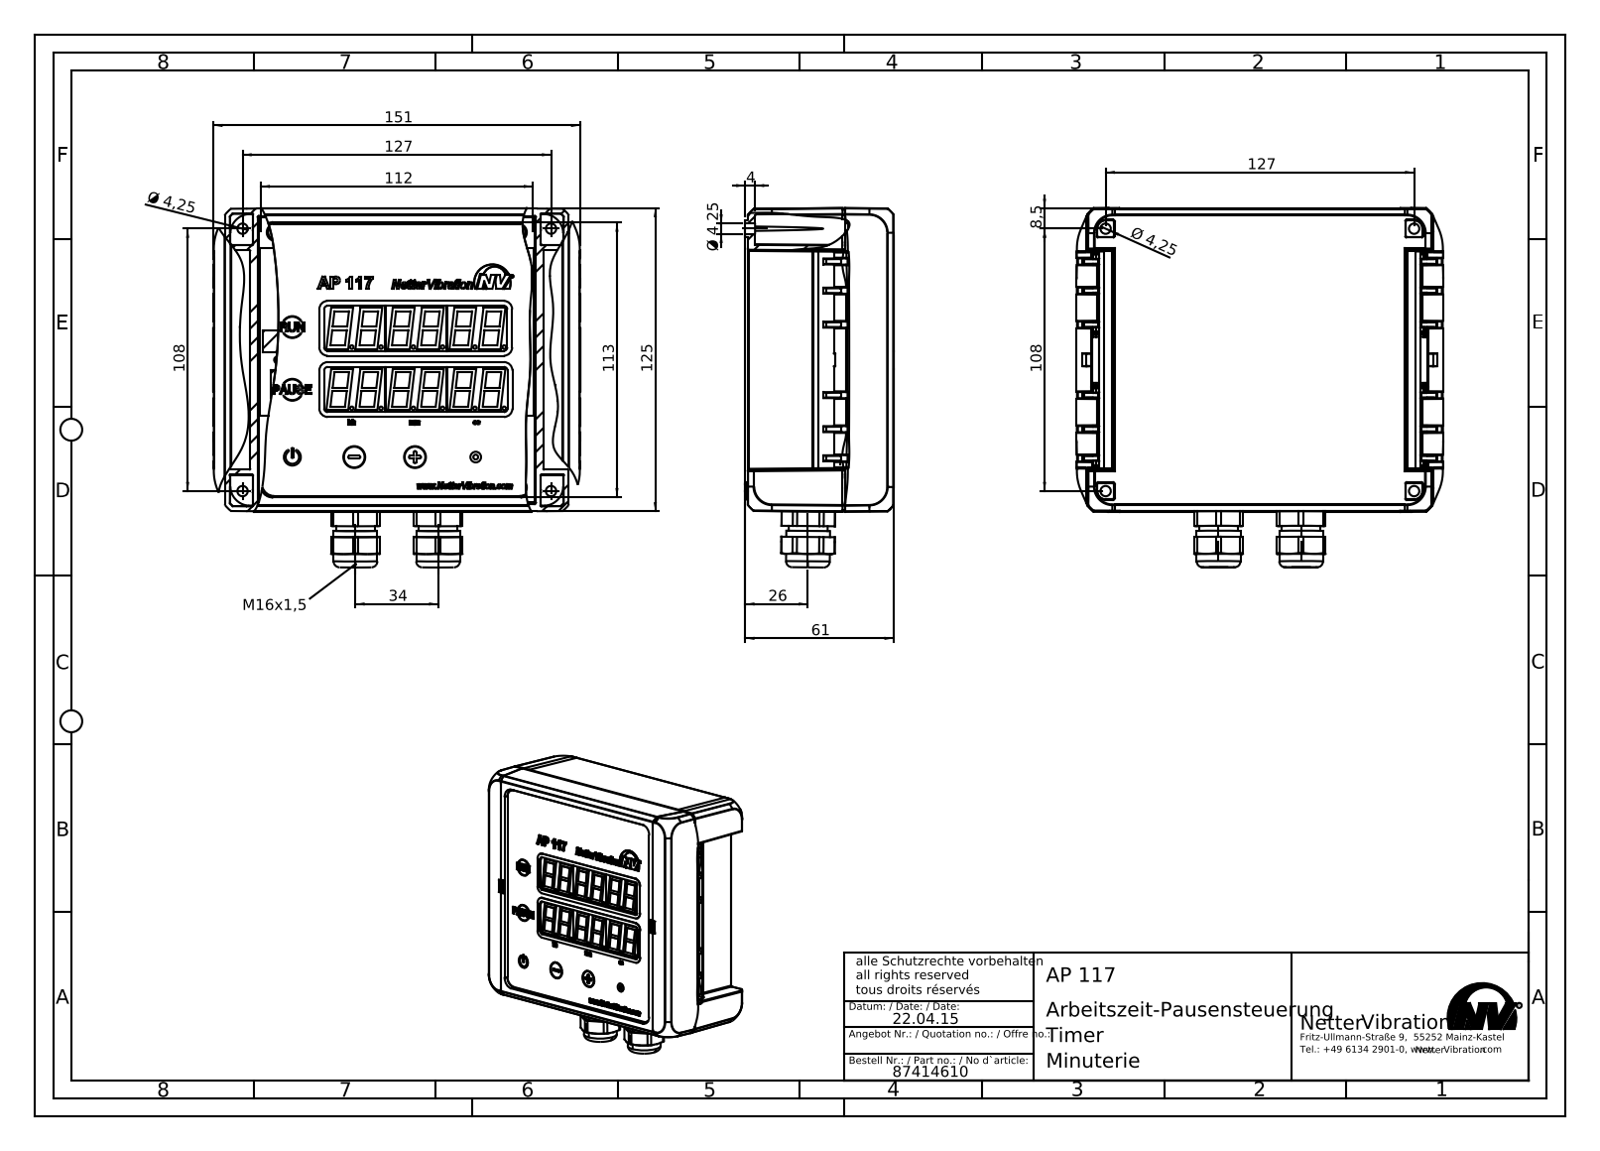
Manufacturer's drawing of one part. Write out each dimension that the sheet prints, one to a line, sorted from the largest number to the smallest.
151
127
127
125
113
112
108
108
61
34
26
8,5
Ø 4,25
Ø 4,25
Ø 4,25
4
